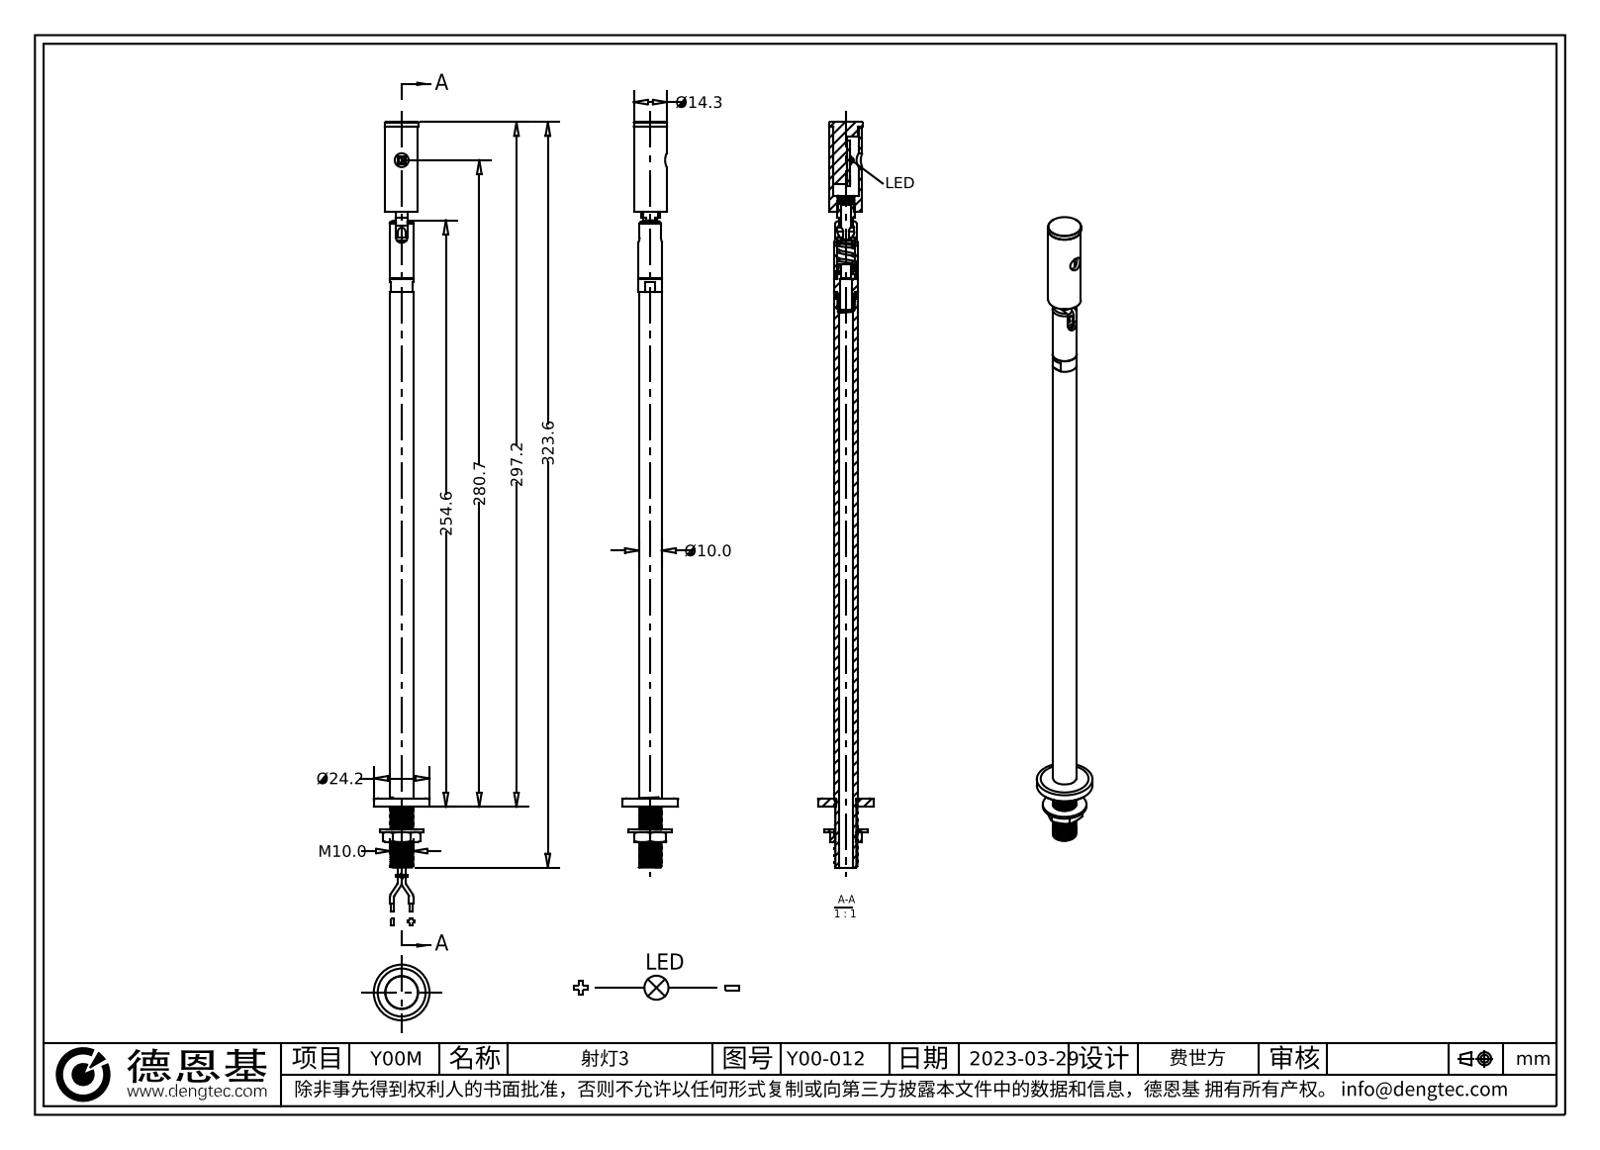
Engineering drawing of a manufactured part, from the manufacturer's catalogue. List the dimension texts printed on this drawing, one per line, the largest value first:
323.6
297.2
280.7
254.6
Ø24.2
Ø14.3
M10.0
Ø10.0
